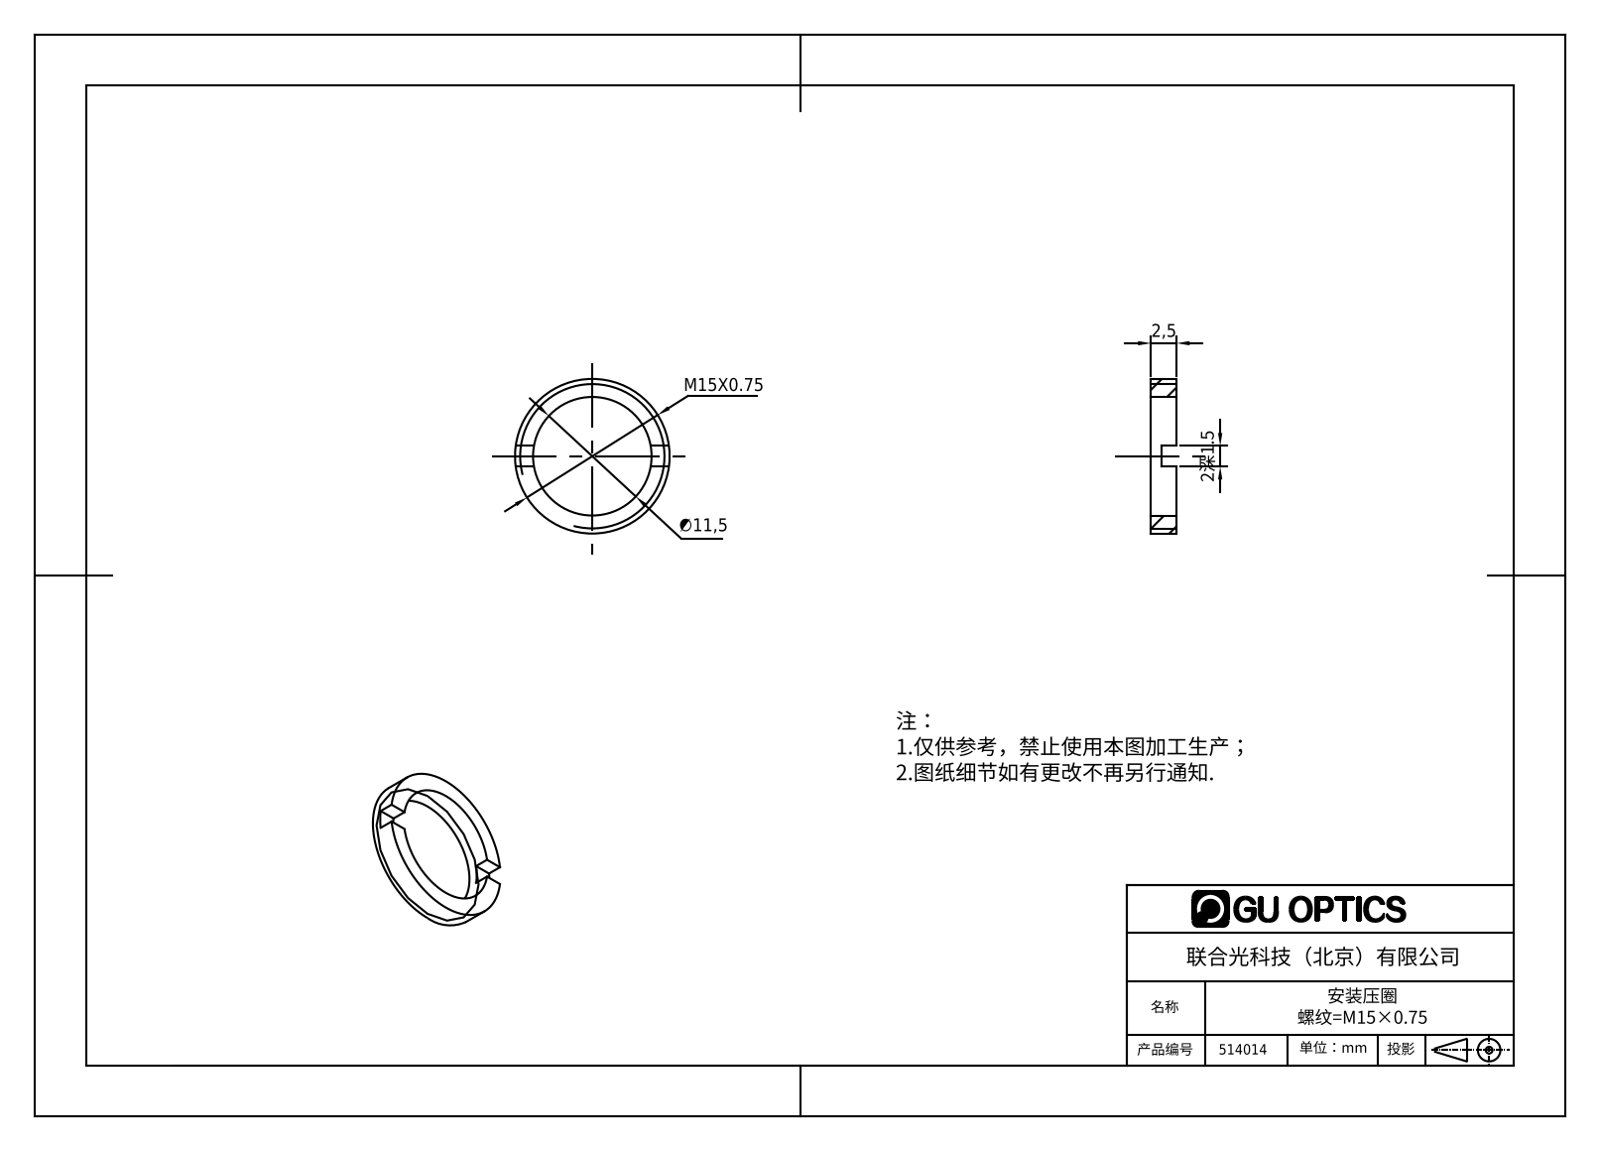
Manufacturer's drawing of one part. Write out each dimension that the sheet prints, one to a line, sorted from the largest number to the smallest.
M15X0.75
∅11,5
2,5
2深1.5
